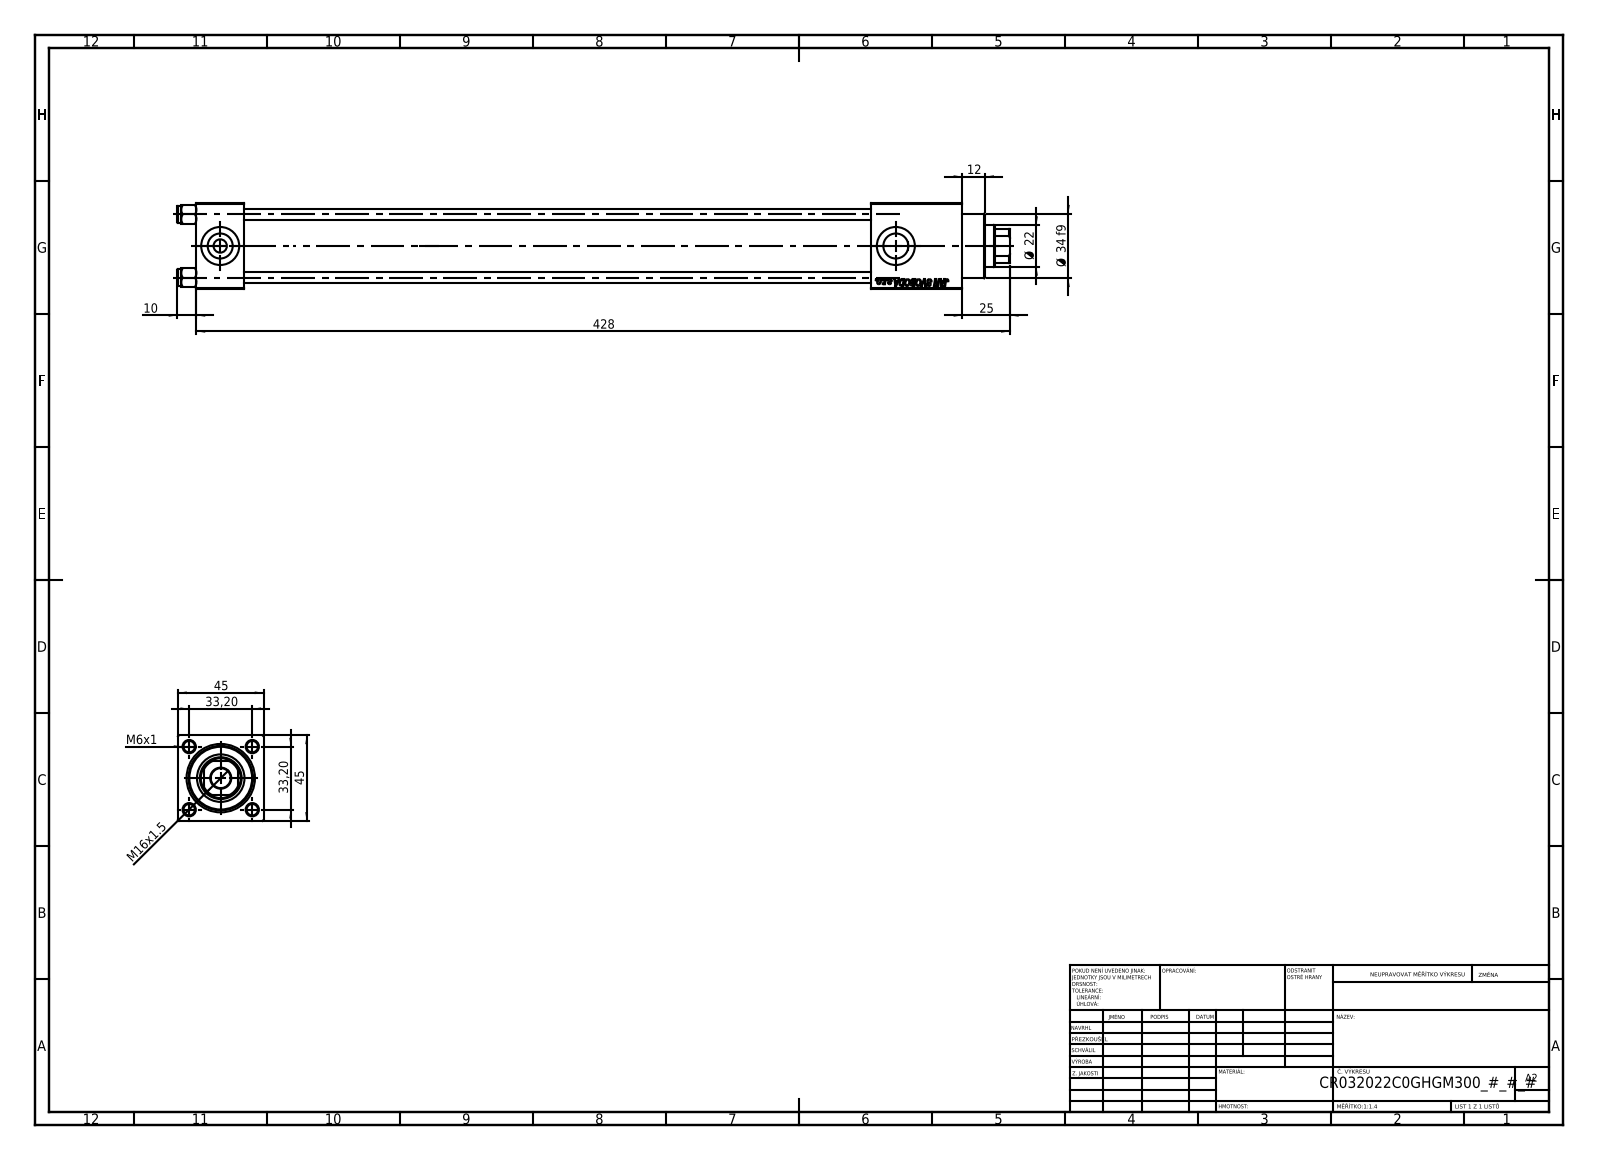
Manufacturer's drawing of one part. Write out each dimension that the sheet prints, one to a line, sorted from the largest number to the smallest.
428
45
45
Ø 34 f9
33,20
33,20
25
Ø 22
M16x1.5
12
10
M6x1
